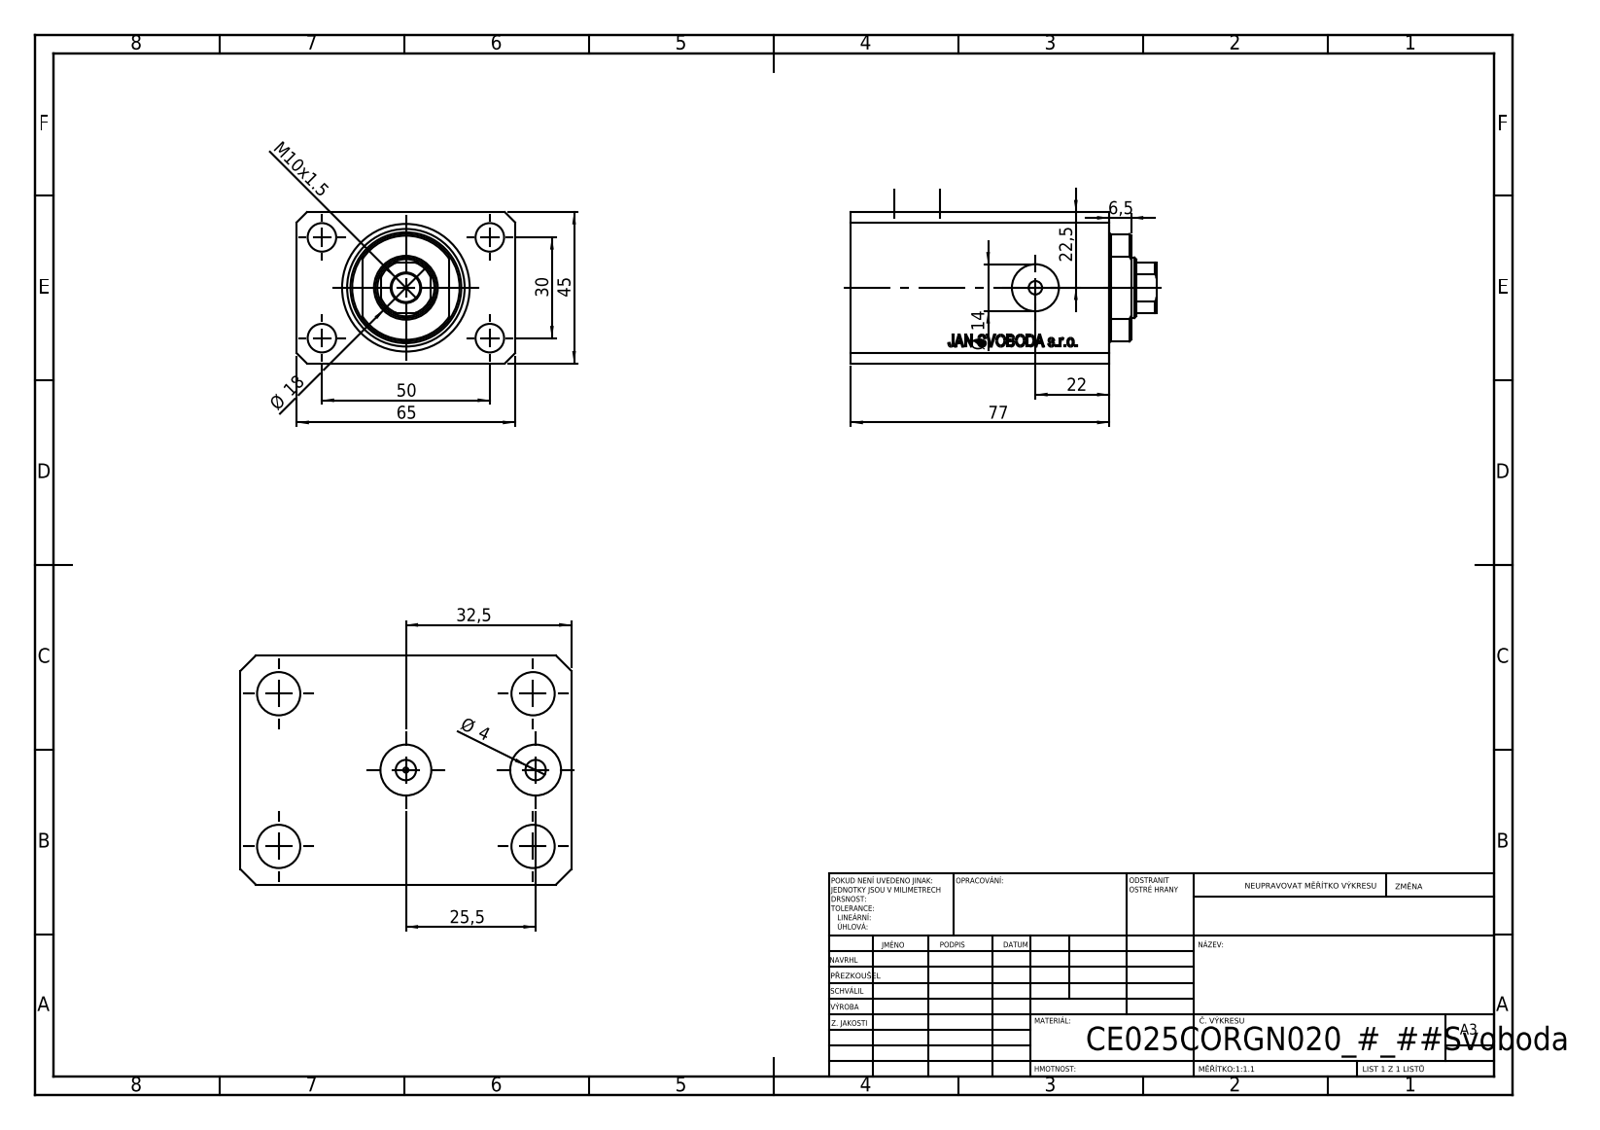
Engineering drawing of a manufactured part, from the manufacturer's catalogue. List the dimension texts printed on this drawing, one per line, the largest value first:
77
65
50
45
32,5
30
25,5
22,5
22
Ø 18
Ø 14
M10x1.5
6,5
Ø 4
